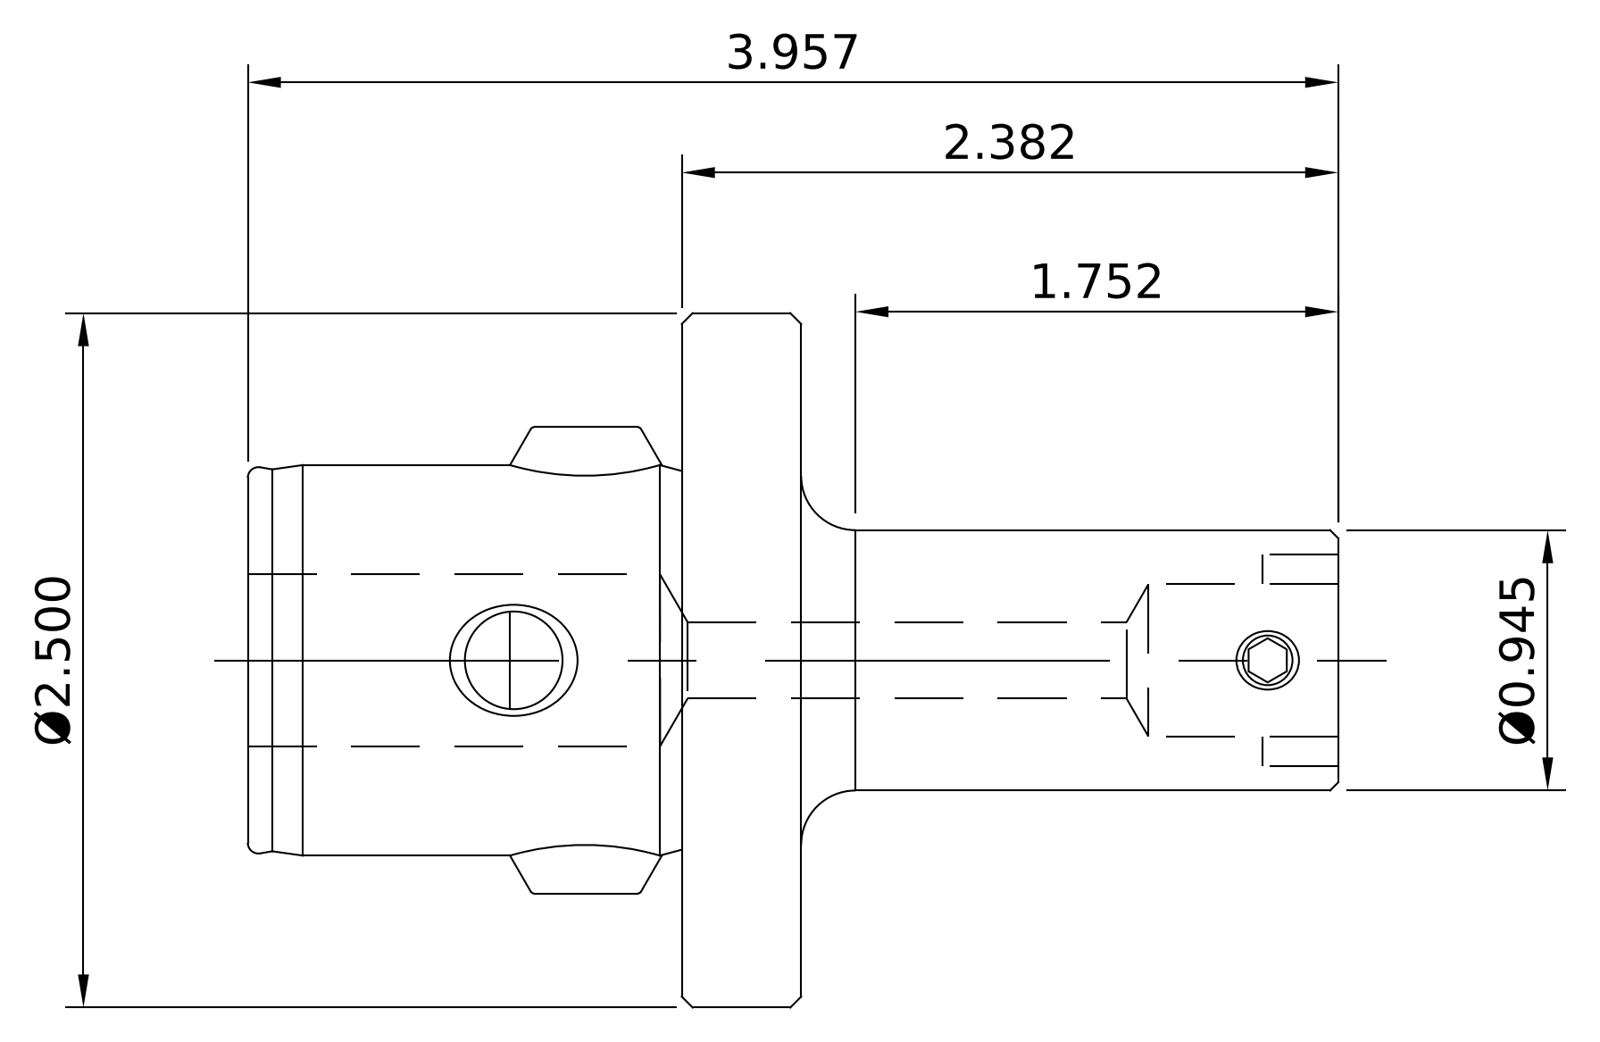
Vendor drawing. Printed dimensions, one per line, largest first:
3.957
Ø2.500
2.382
1.752
Ø0.945
